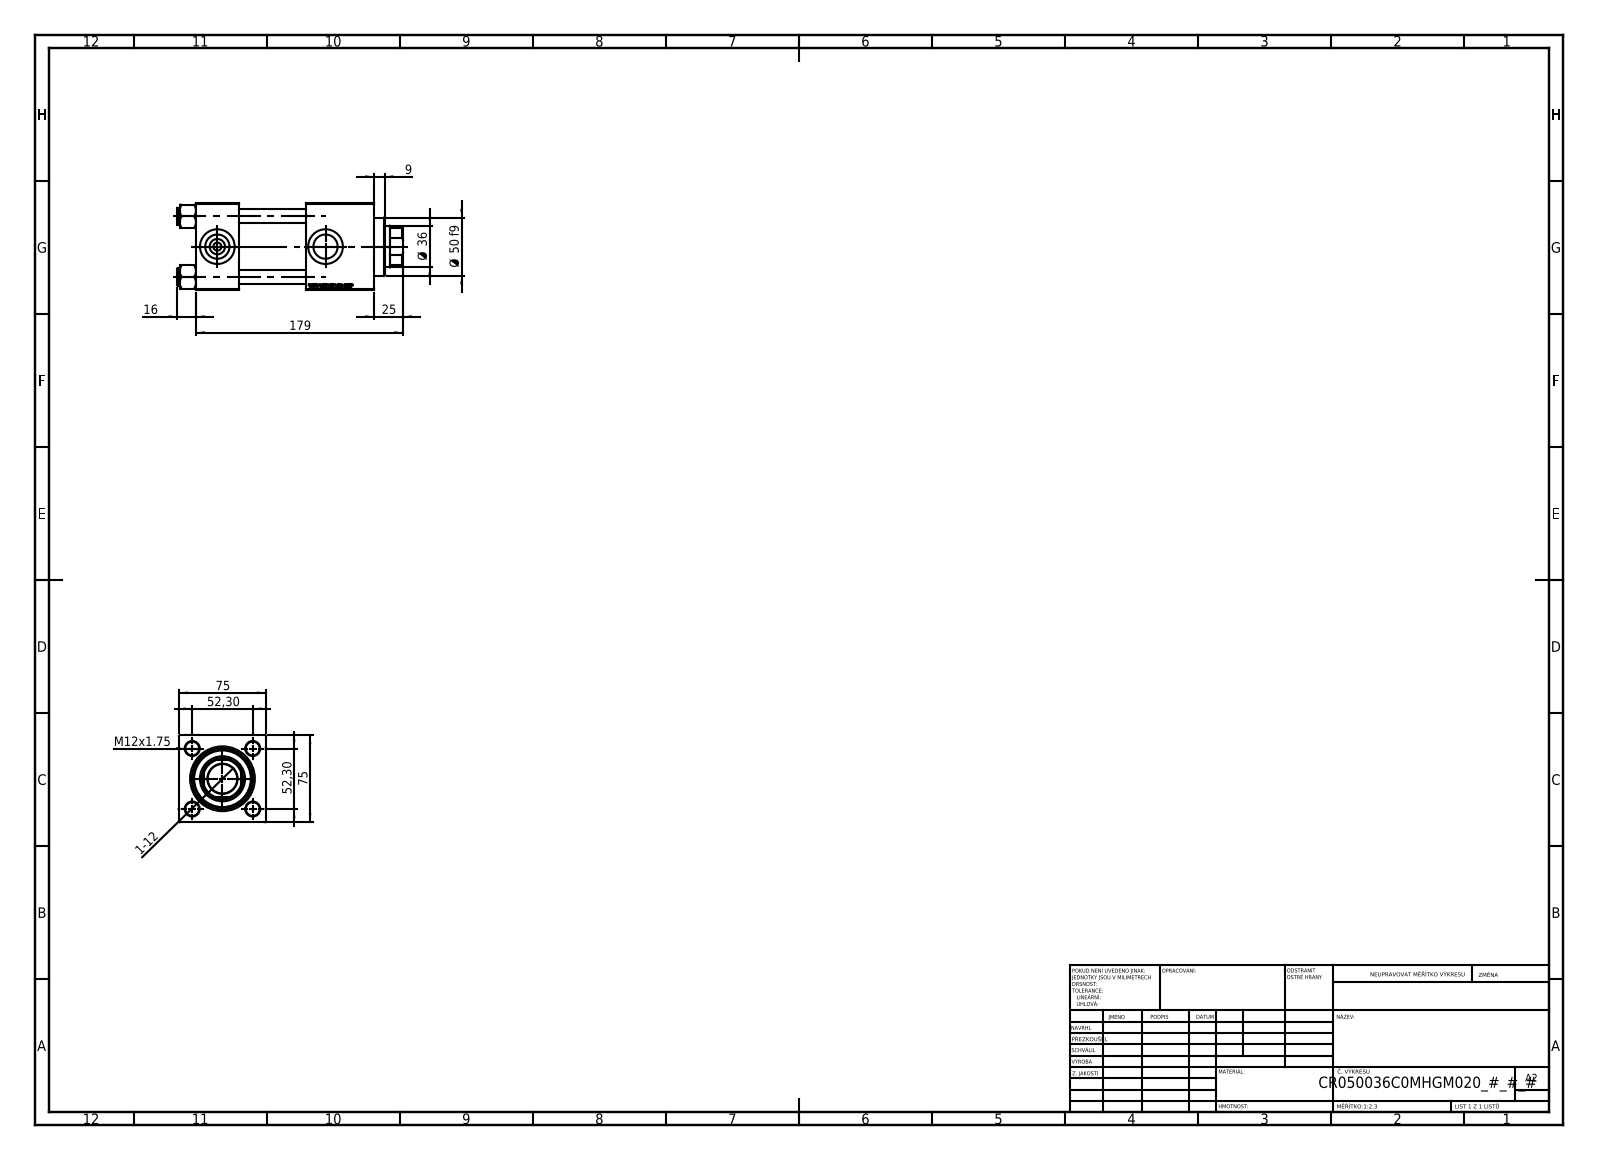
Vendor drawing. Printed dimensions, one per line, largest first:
179
75
75
52,30
52,30
Ø 50 f9
Ø 36
25
16
M12x1.75
9
1-12
